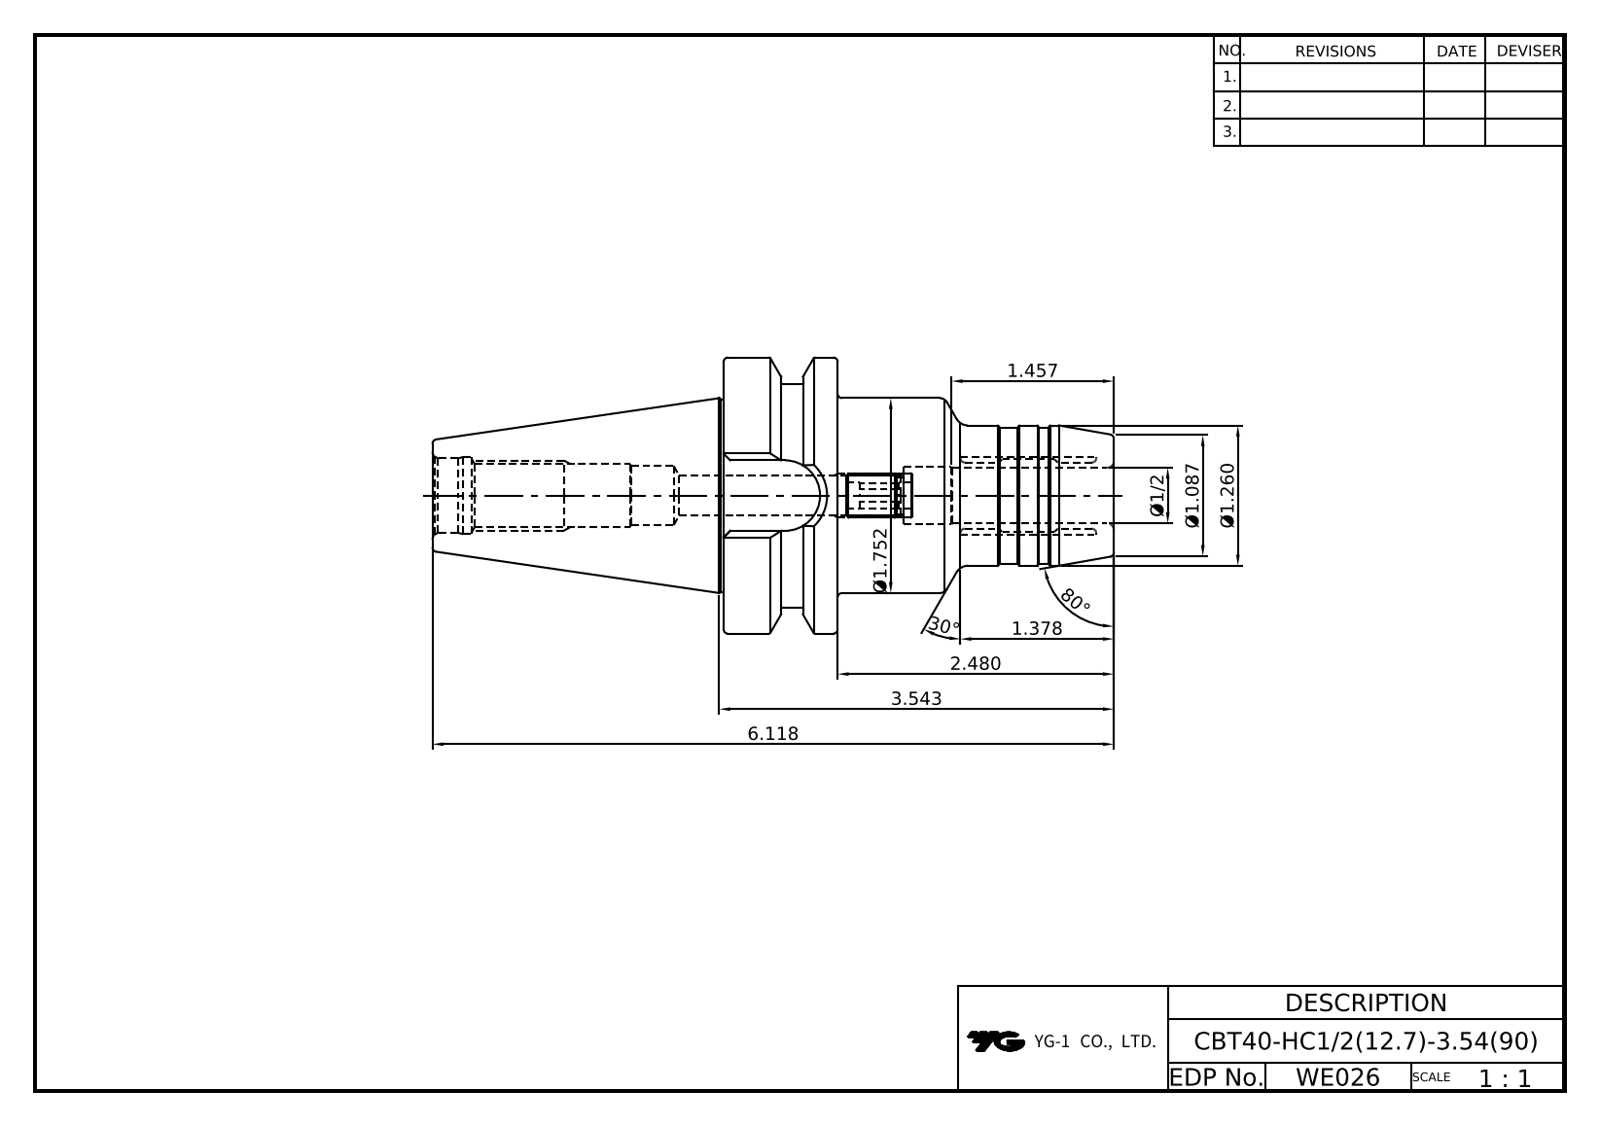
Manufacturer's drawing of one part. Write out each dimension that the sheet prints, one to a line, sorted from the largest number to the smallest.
80°
30°
6.118
3.543
2.480
Ø1.752
1.457
1.378
Ø1.260
Ø1.087
Ø1/2
